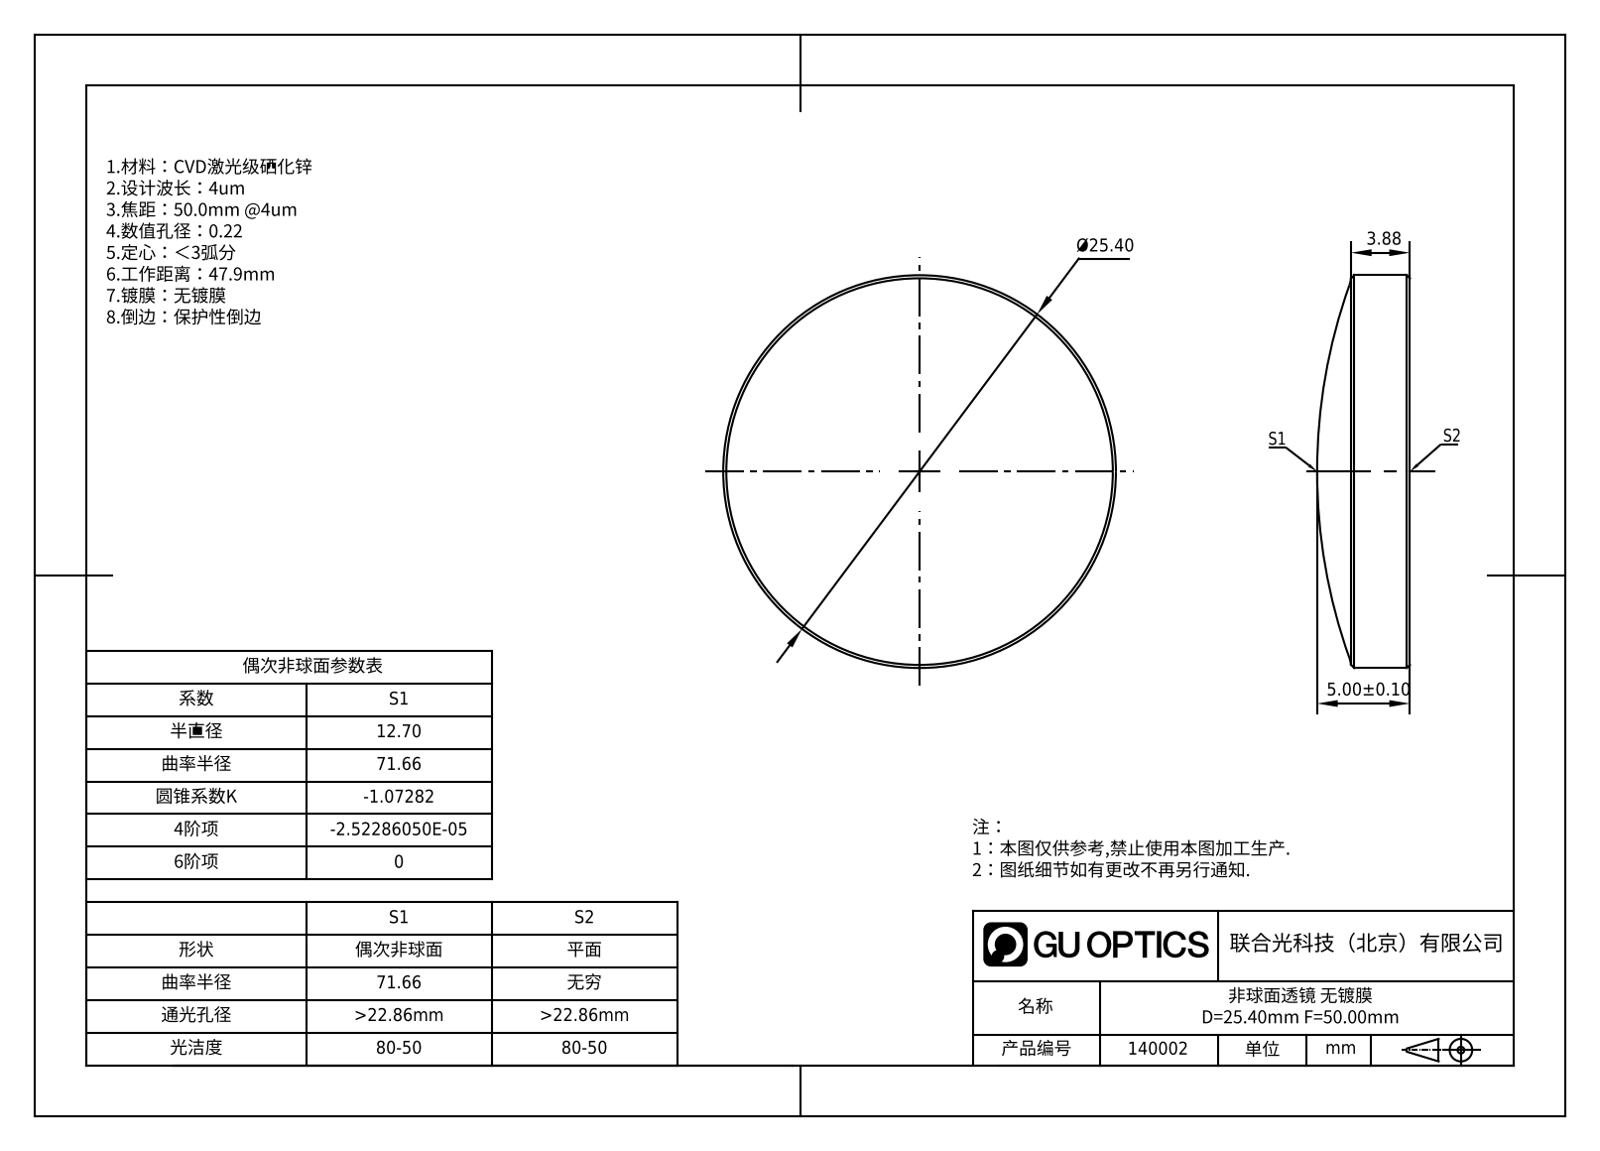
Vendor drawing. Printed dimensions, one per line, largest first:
Ø25.40
5.00±0.10
3.88
